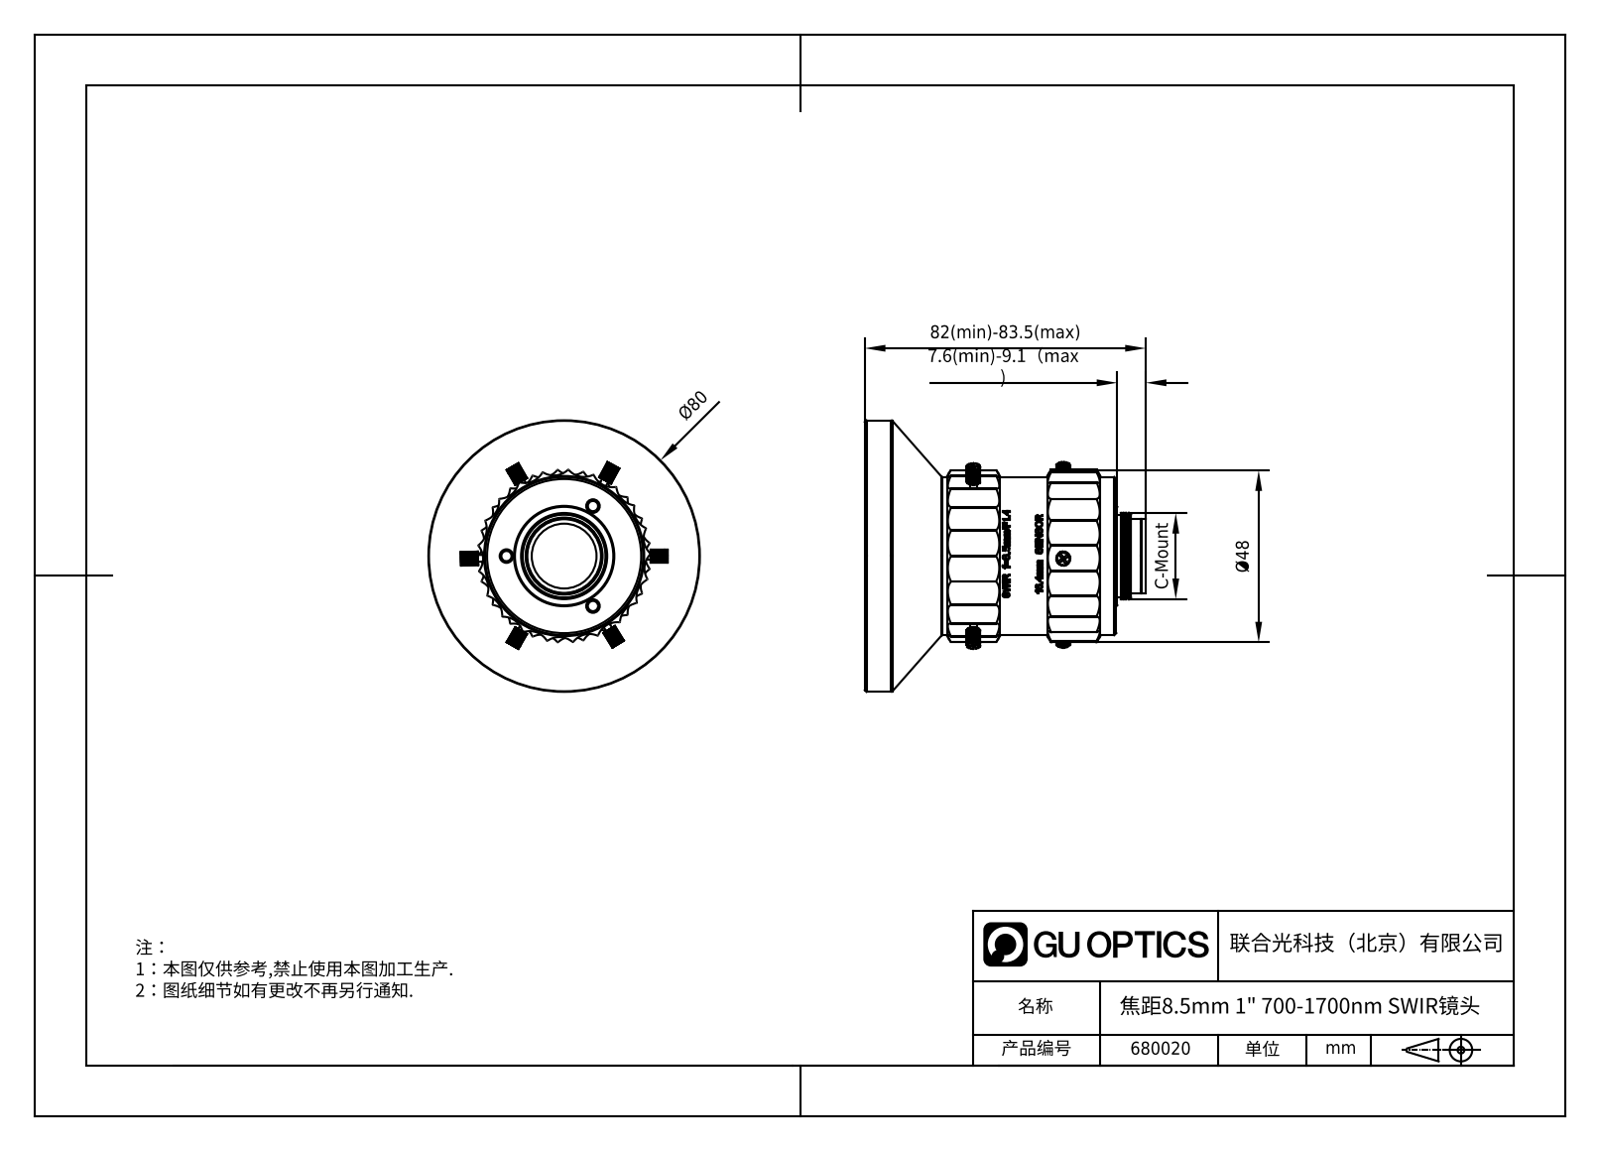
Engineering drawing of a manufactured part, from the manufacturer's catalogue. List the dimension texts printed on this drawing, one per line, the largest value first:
82(min)-83.5(max)
Ø80
Ø48
7.6(min)-9.1（max )
C-Mount
